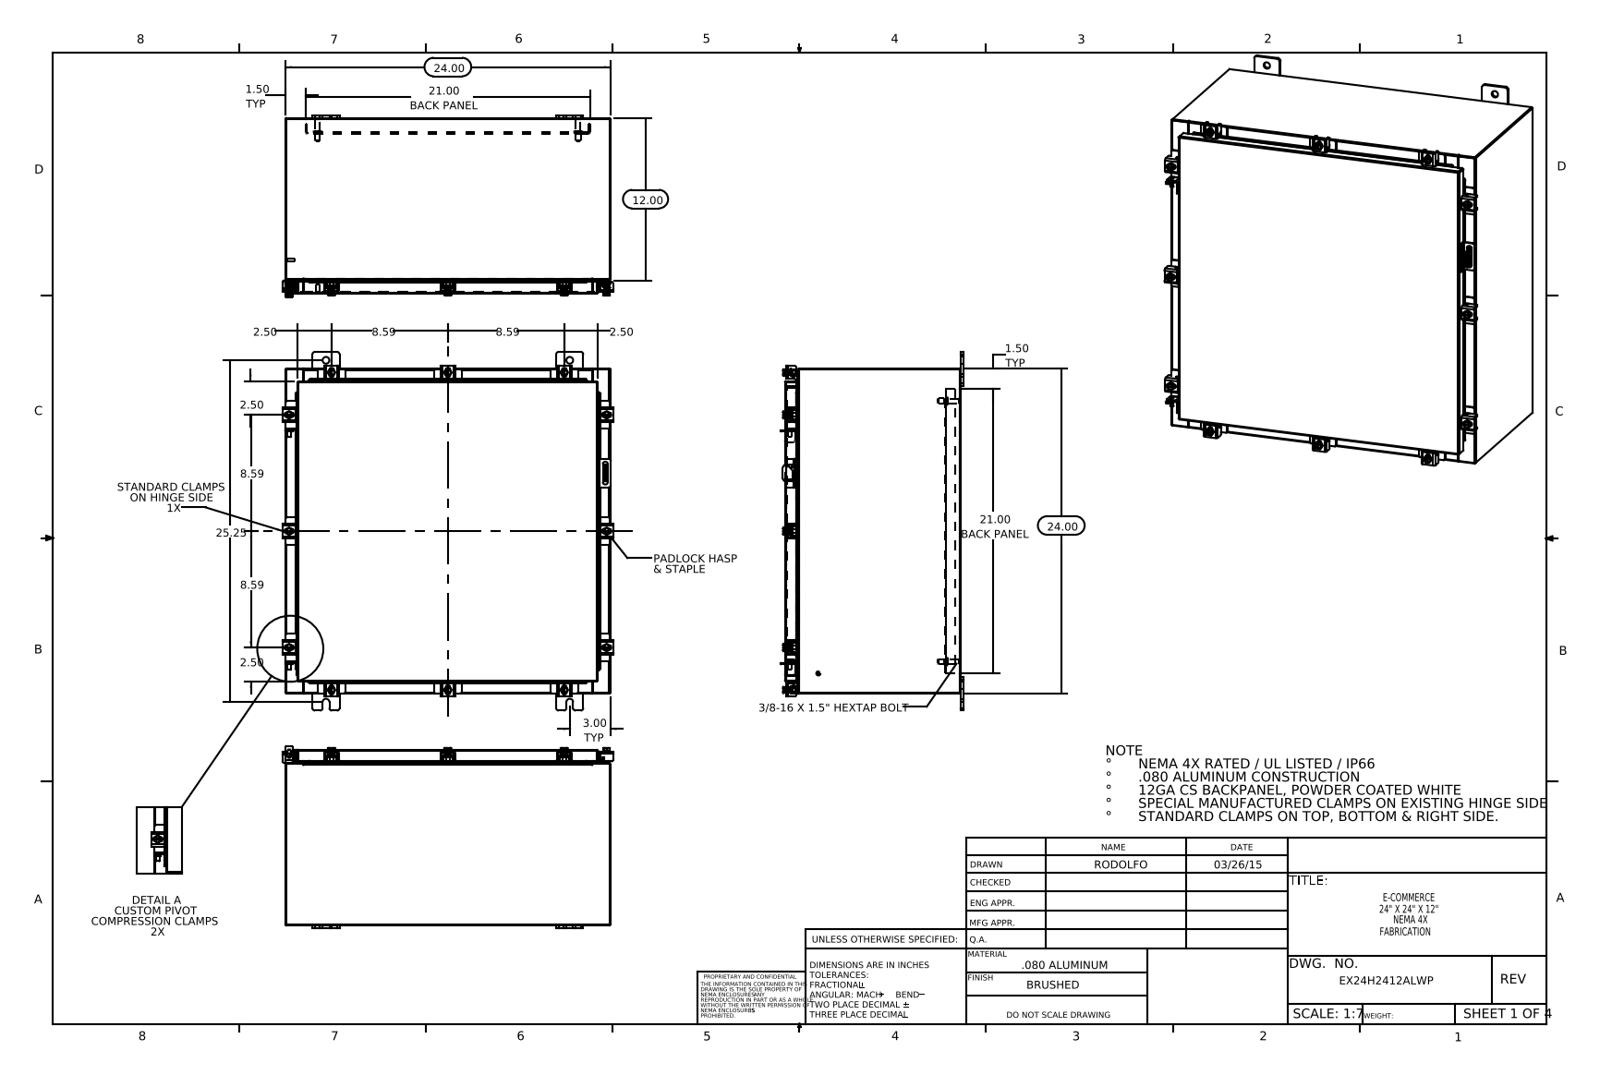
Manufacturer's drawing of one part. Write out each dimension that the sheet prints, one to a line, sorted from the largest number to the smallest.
25.25
24.00
24.00
21.00 BACK PANEL
21.00 BACK PANEL
12.00
8.59
8.59
8.59
8.59
3.00 TYP
2.50
2.50
2.50
2.50
1.50 TYP
1.50 TYP
